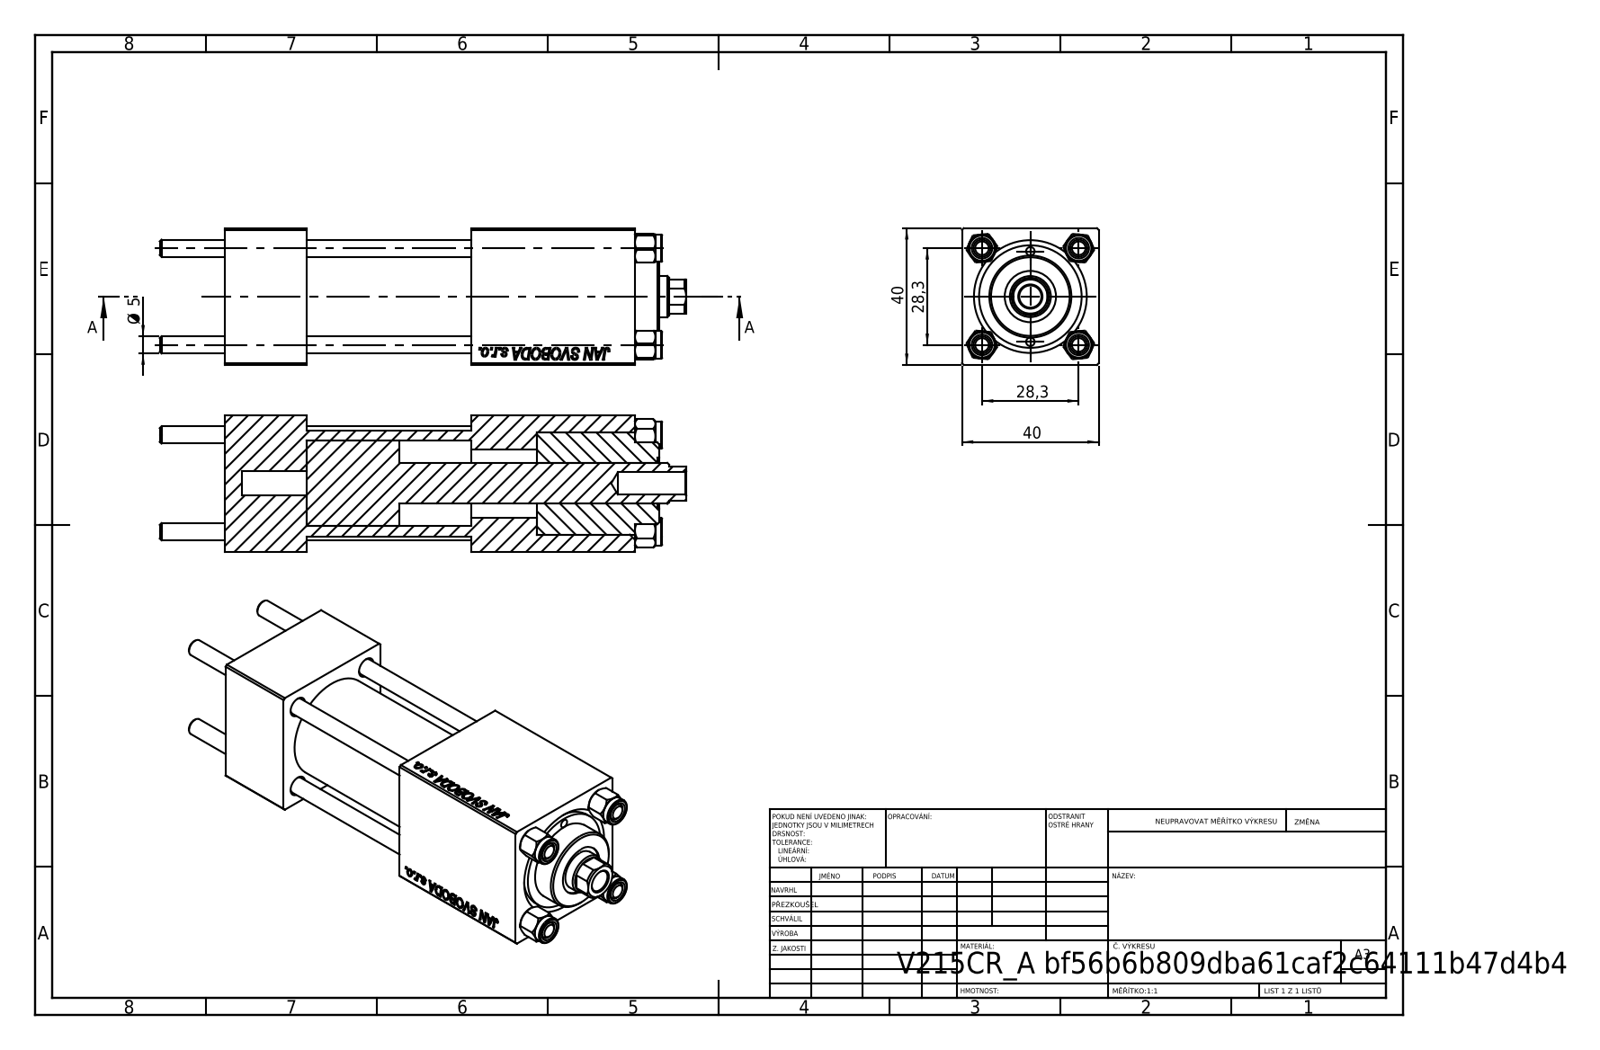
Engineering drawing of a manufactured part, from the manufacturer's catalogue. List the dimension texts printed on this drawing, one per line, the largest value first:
40
40
28,3
28,3
Ø 5
